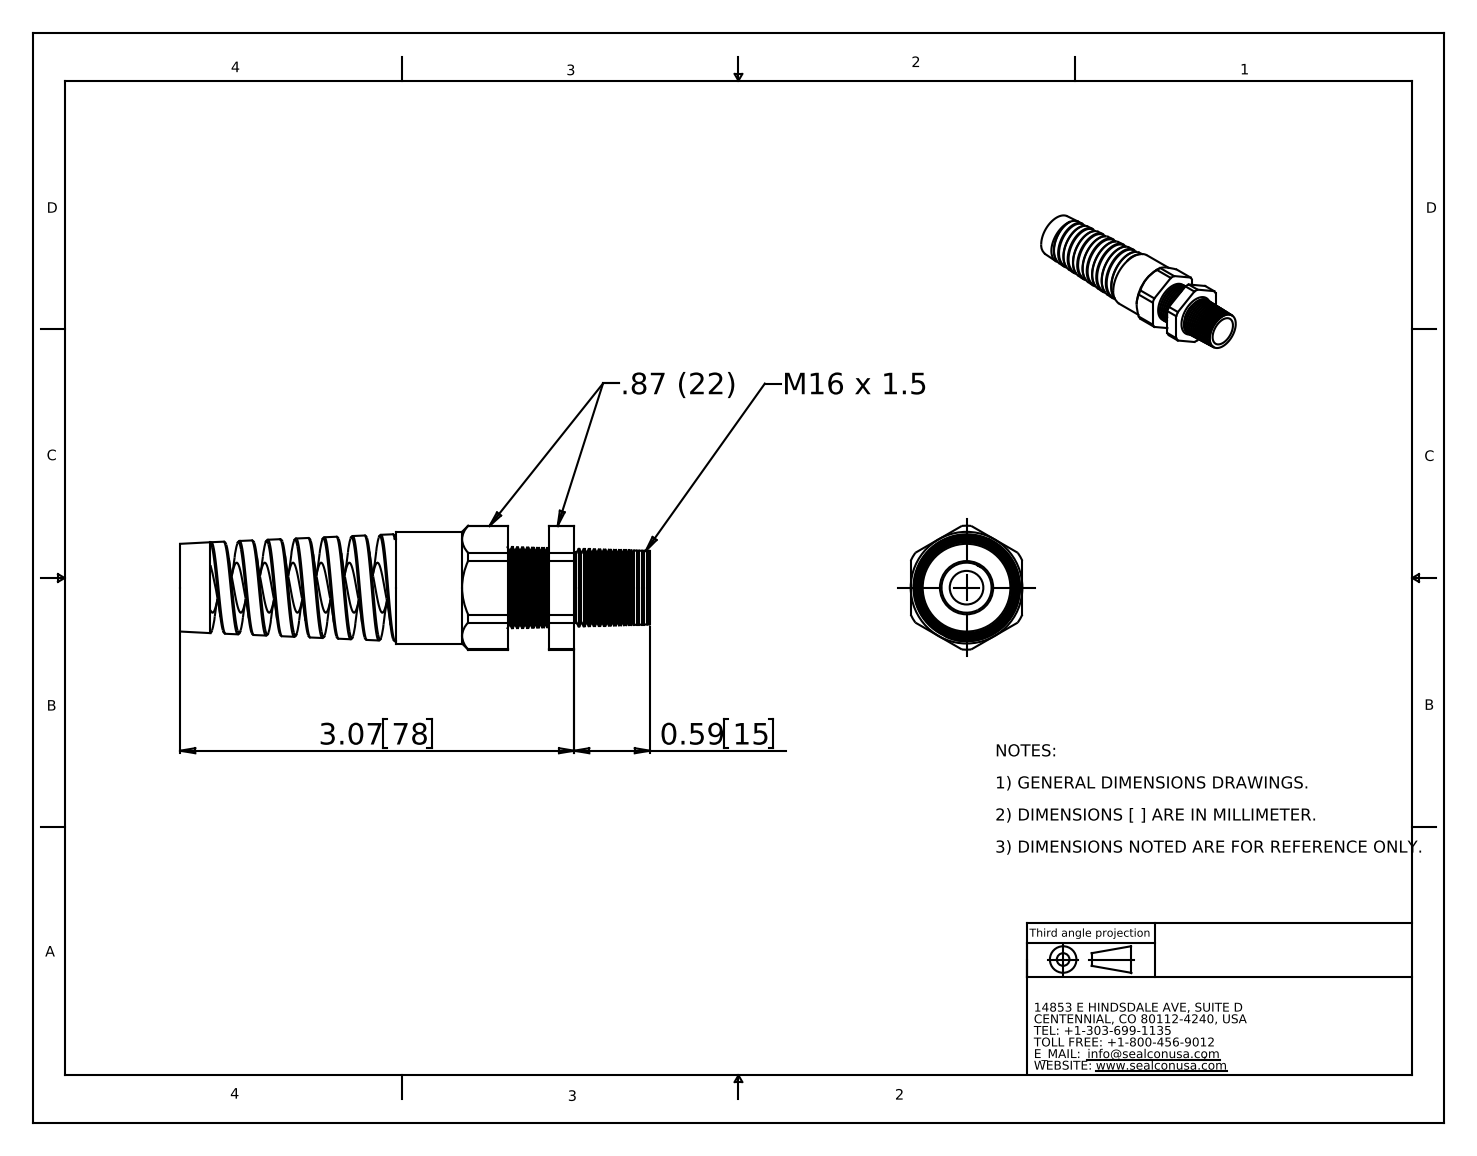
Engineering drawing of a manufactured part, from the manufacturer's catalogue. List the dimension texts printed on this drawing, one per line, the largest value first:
3.07 78
0.59 15
